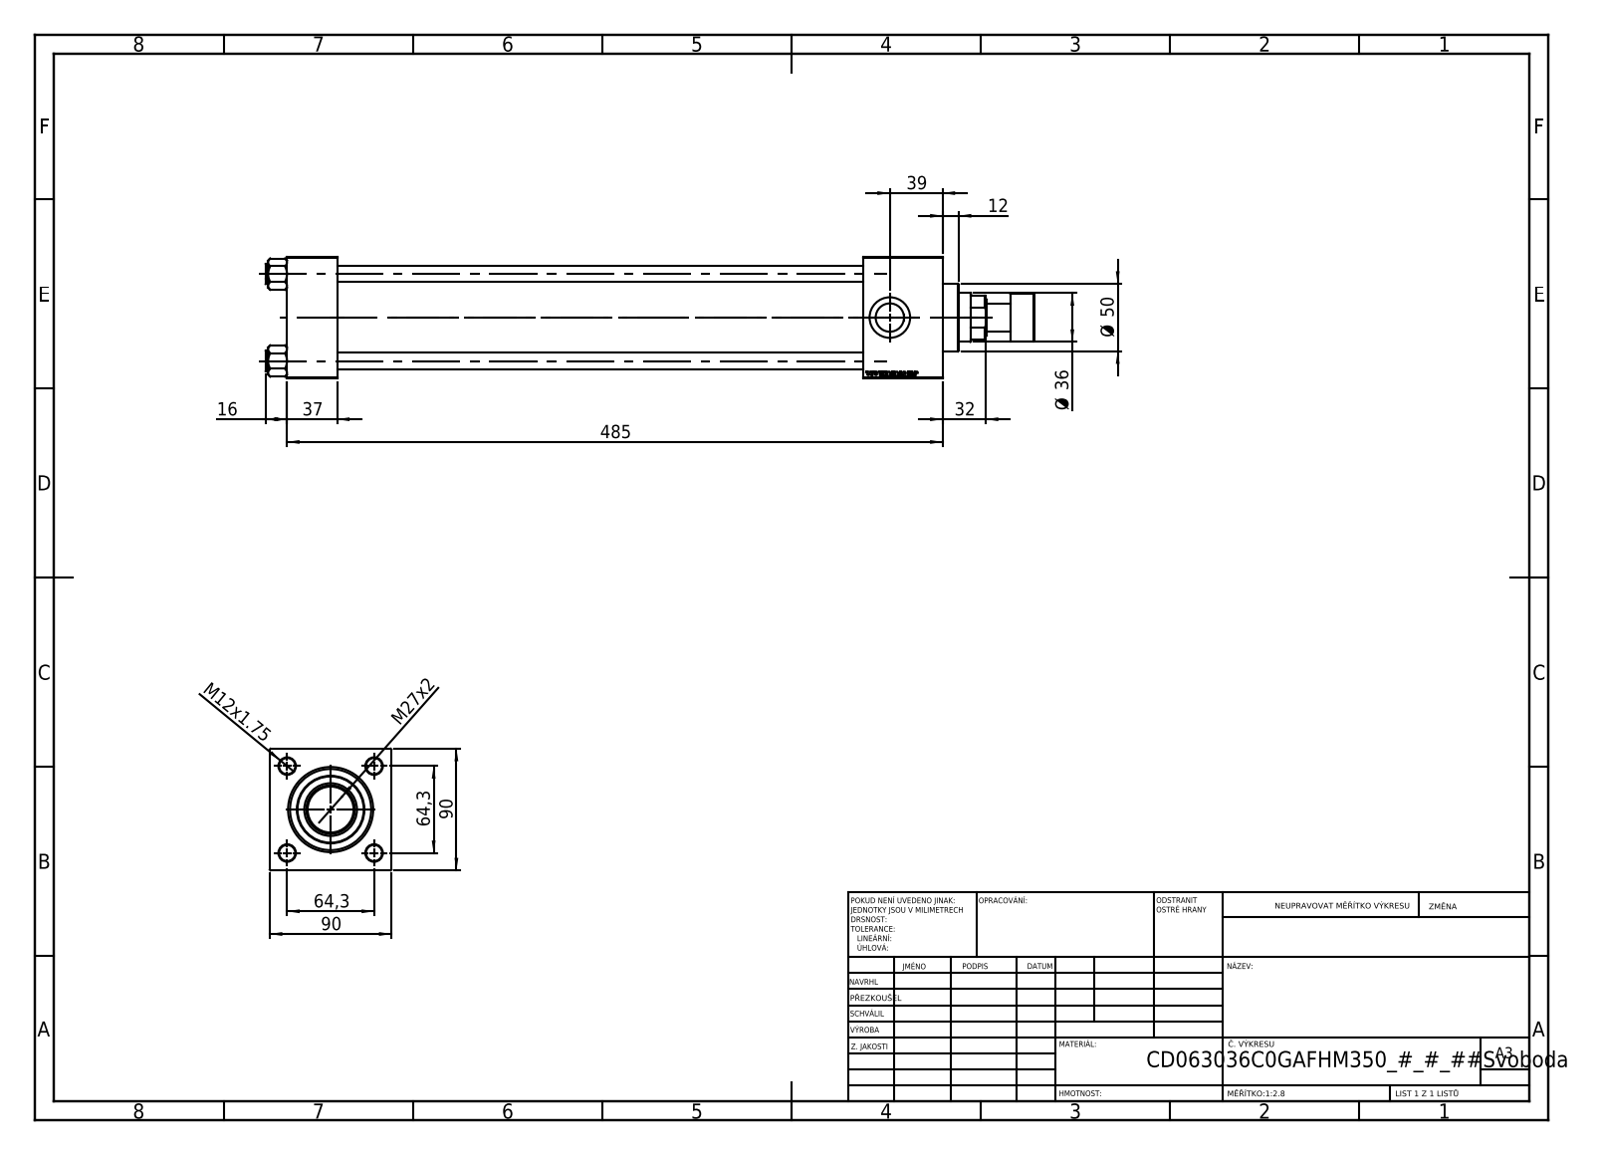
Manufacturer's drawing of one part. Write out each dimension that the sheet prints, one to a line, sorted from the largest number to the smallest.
485
90
90
64,3
64,3
Ø 50
39
37
Ø 36
32
M27x2
16
12
M12x1.75
